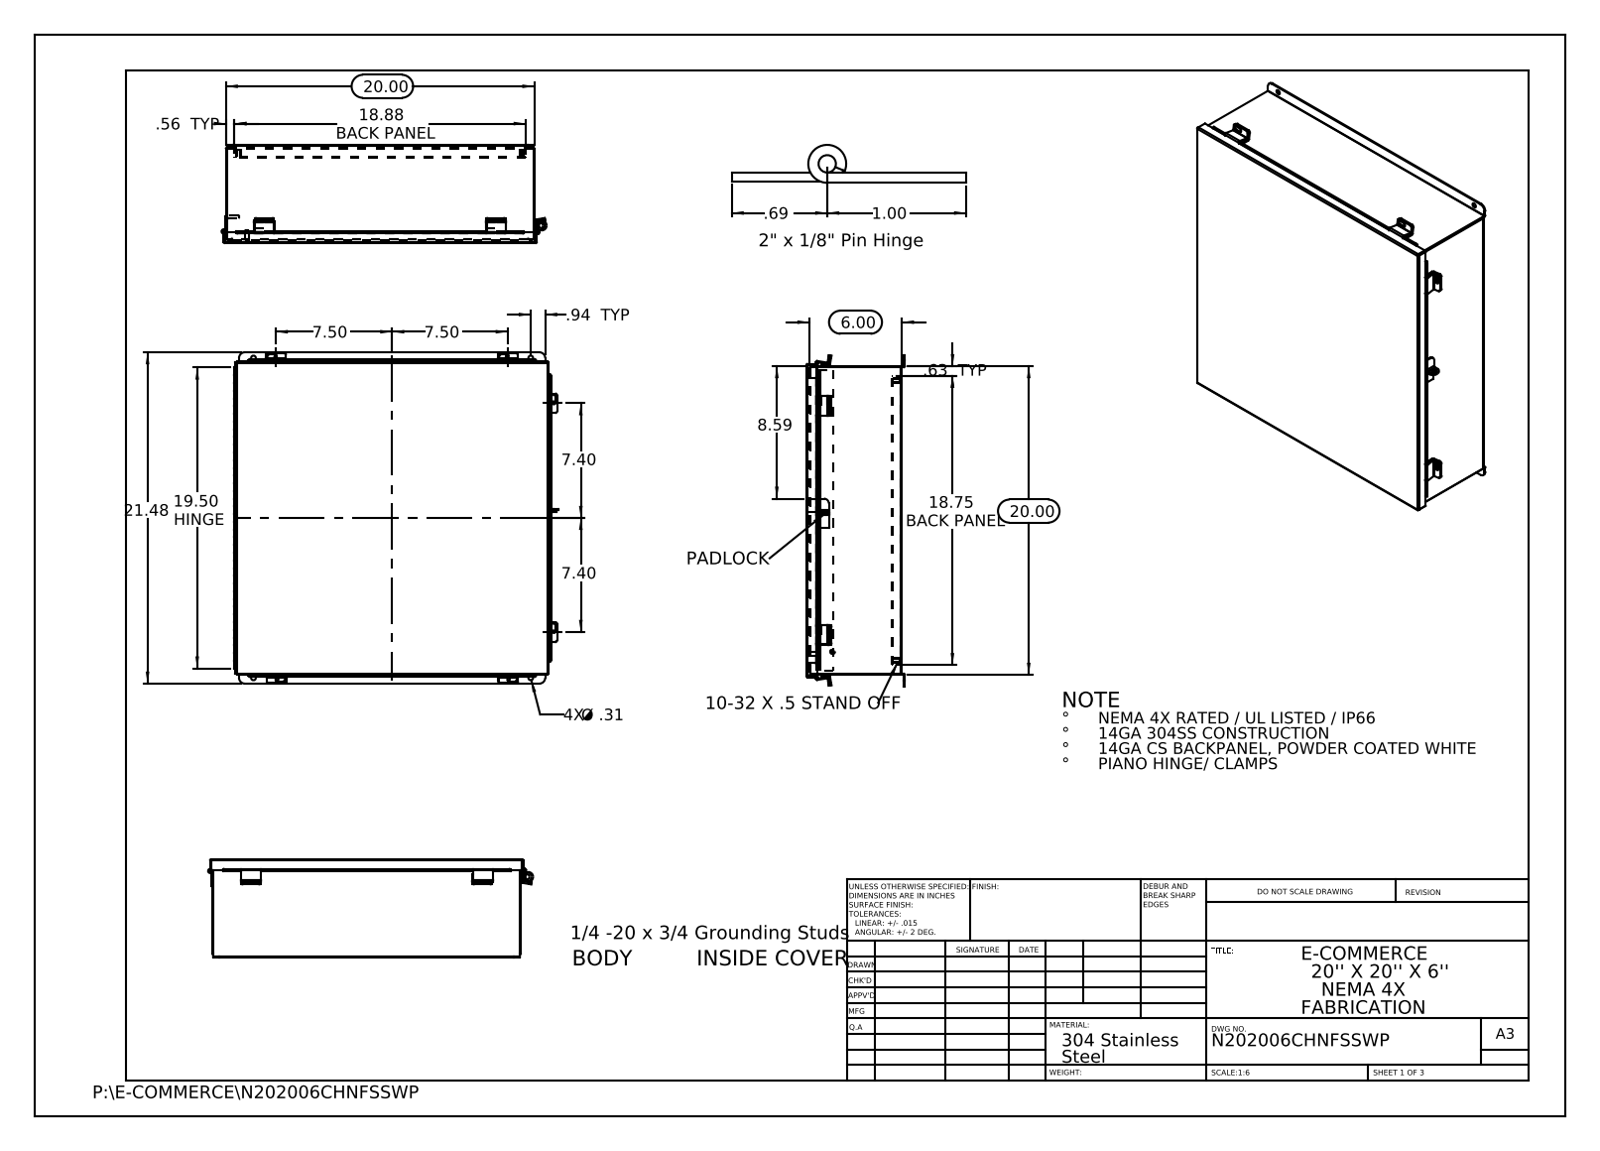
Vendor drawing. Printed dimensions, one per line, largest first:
21.48
20.00
20.00
19.50 HINGE
18.88 BACK PANEL
18.75 BACK PANEL
8.59
7.50
7.50
7.40
7.40
6.00
1.00
.94 TYP
.69
.63 TYP
.56 TYP
4X Ø .31
